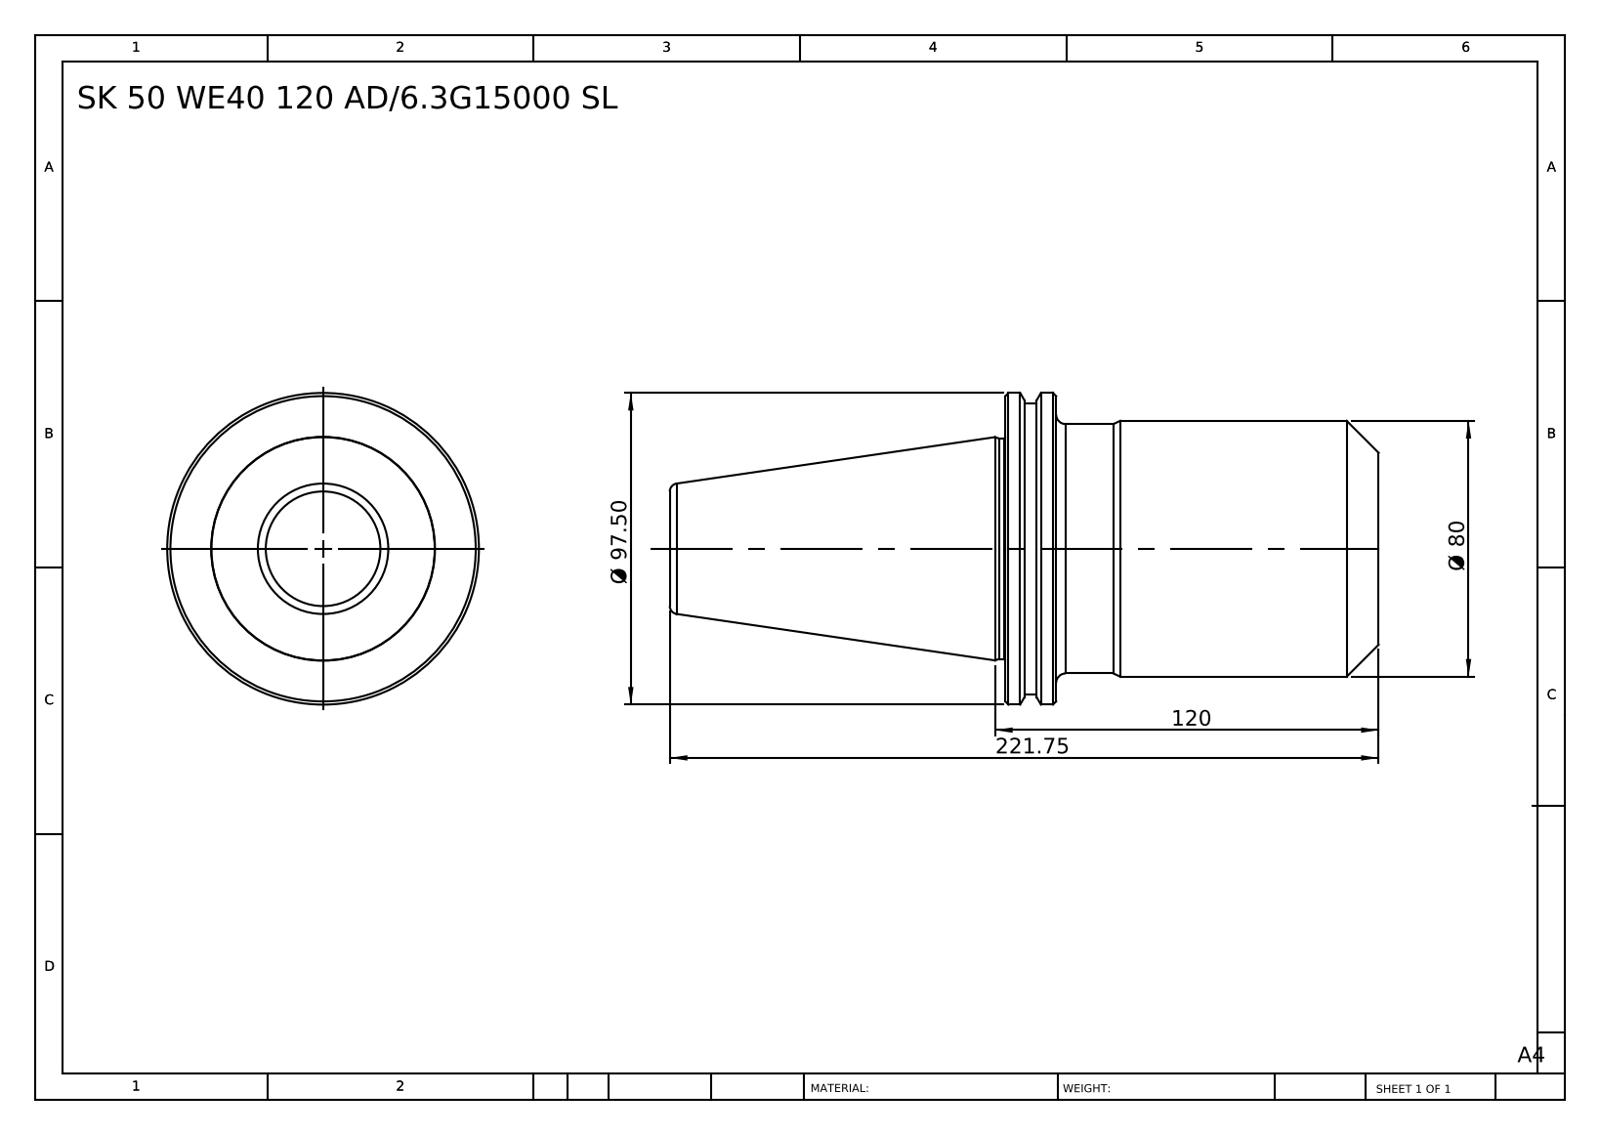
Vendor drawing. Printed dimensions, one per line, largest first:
221.75
120
Ø 97.50
Ø 80
